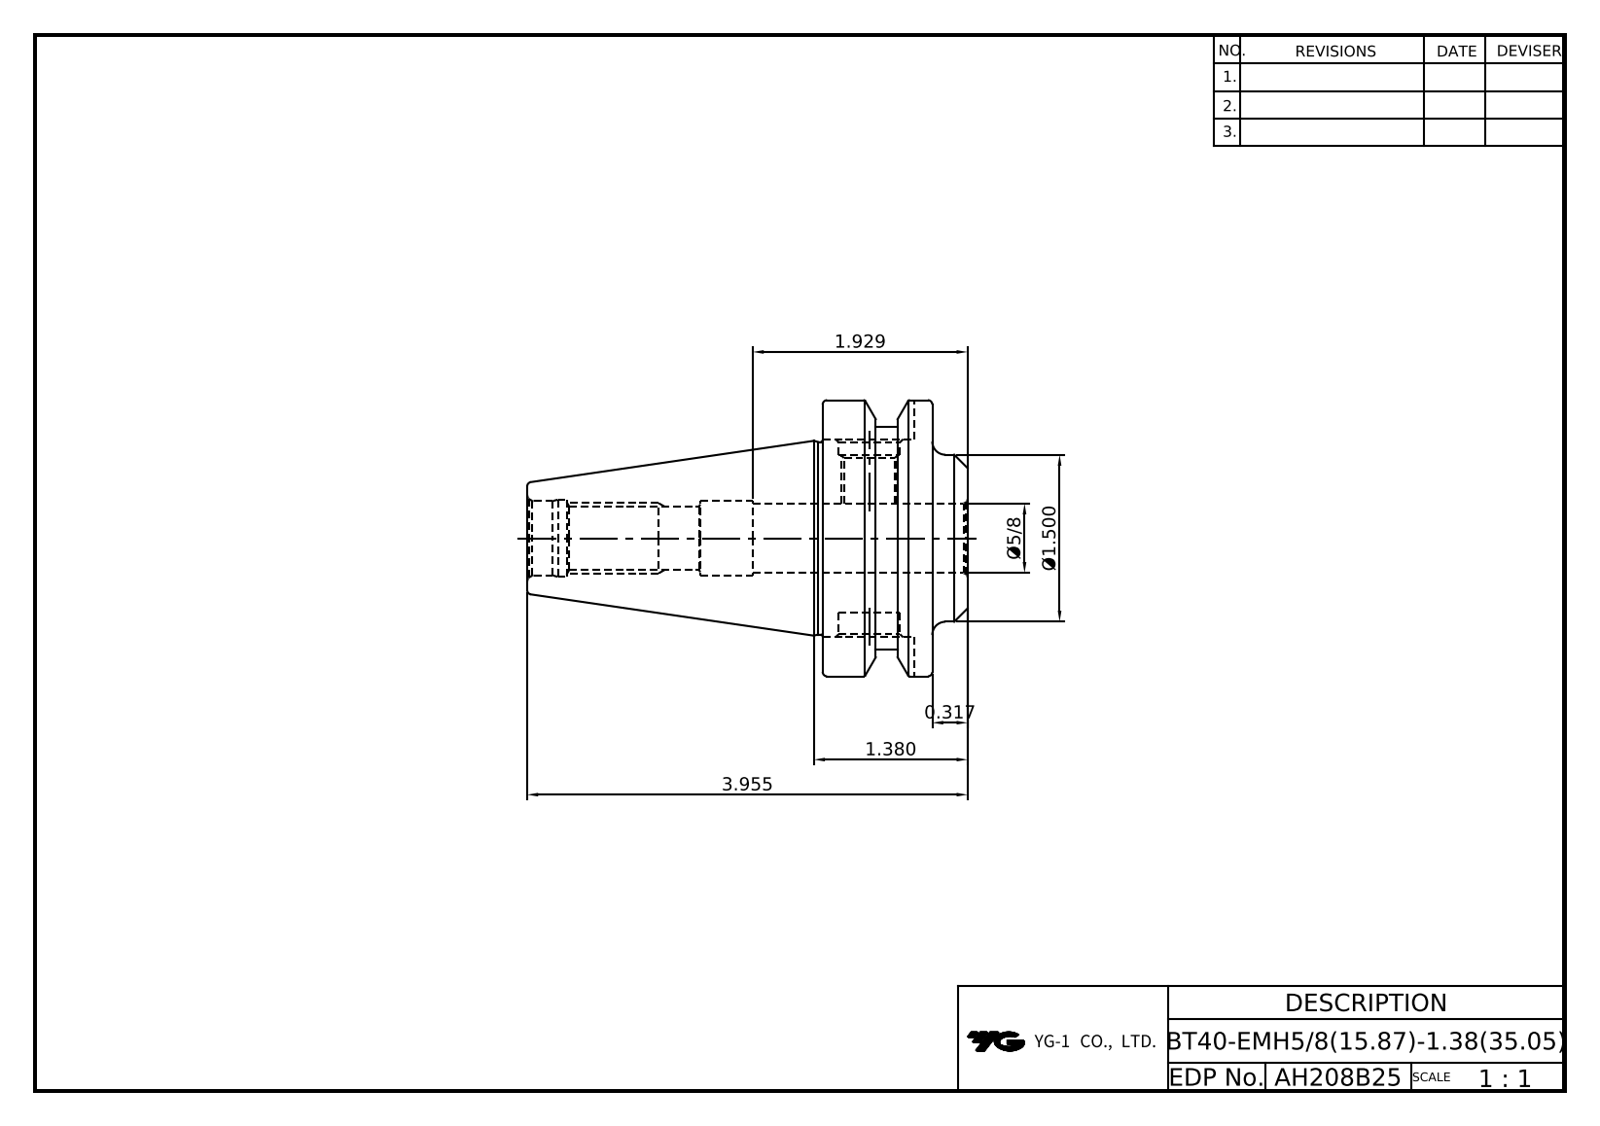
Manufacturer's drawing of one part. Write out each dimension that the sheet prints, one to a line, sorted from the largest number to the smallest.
3.955
1.929
Ø1.500
1.380
Ø5/8
0.317
